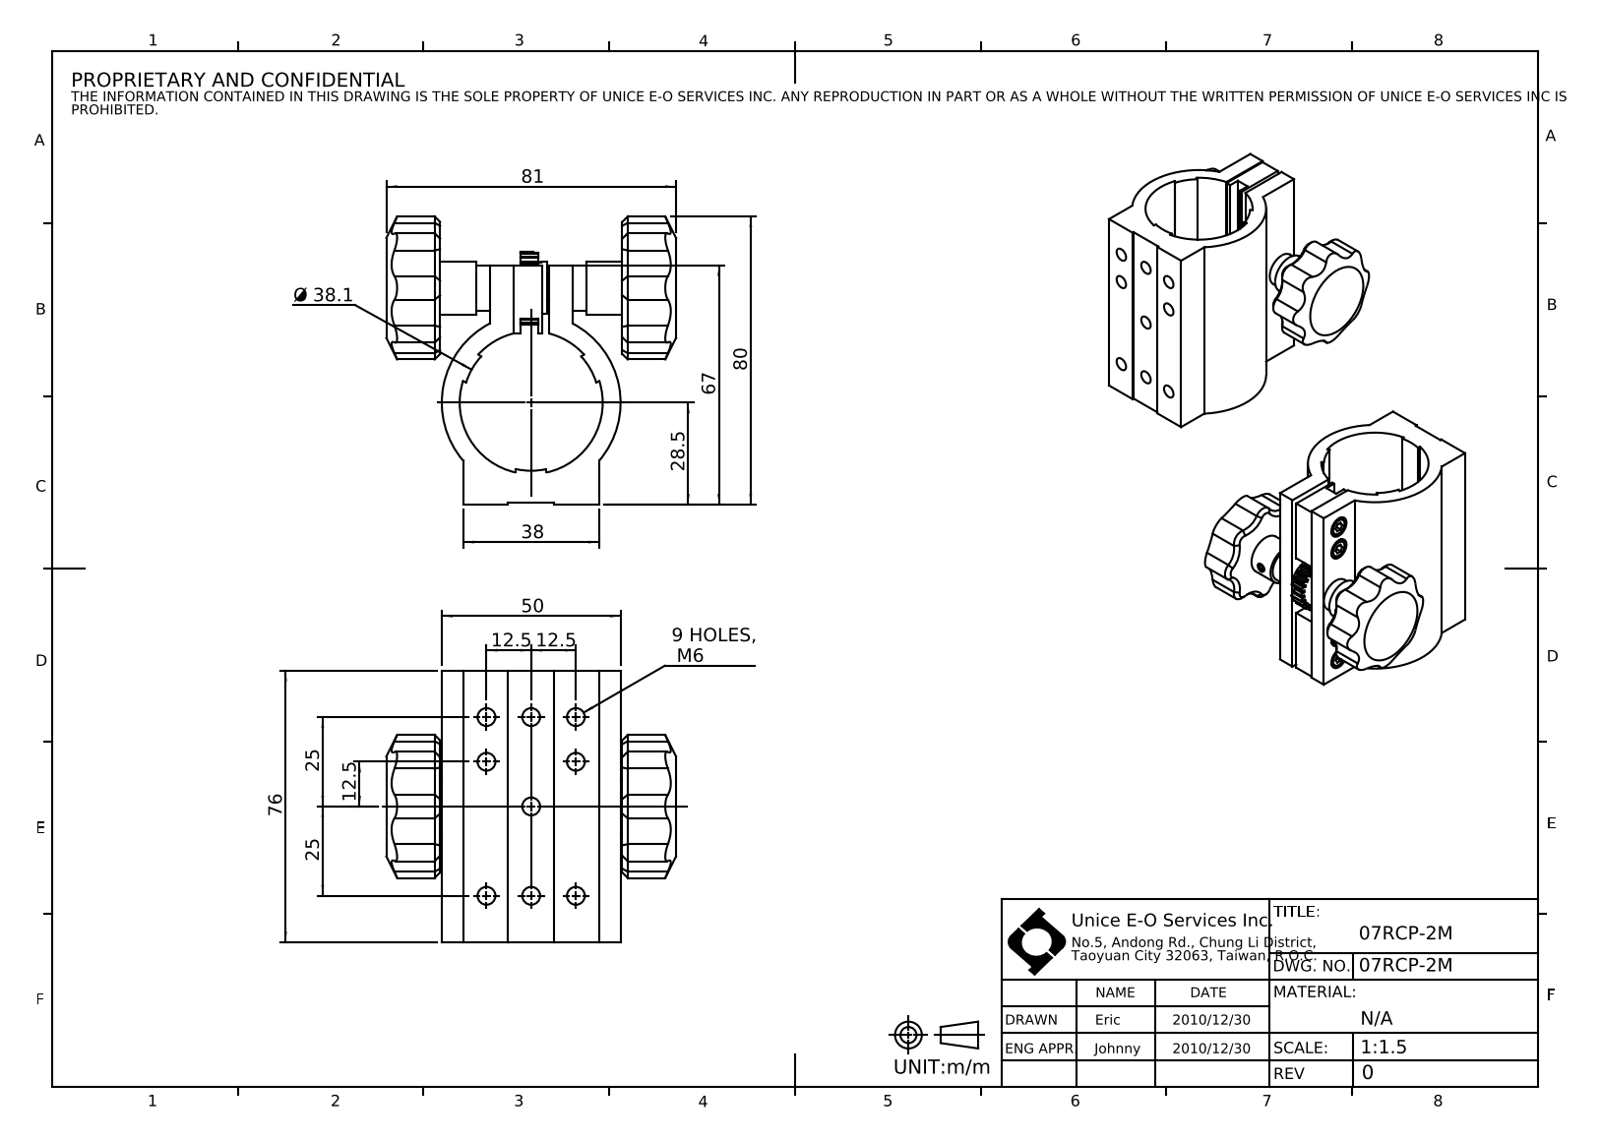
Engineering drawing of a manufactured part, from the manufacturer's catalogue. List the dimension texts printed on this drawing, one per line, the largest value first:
81
80
76
67
50
Ø 38.1
38
28.5
25
25
12.5
12.5
12.5
9 HOLES, M6
